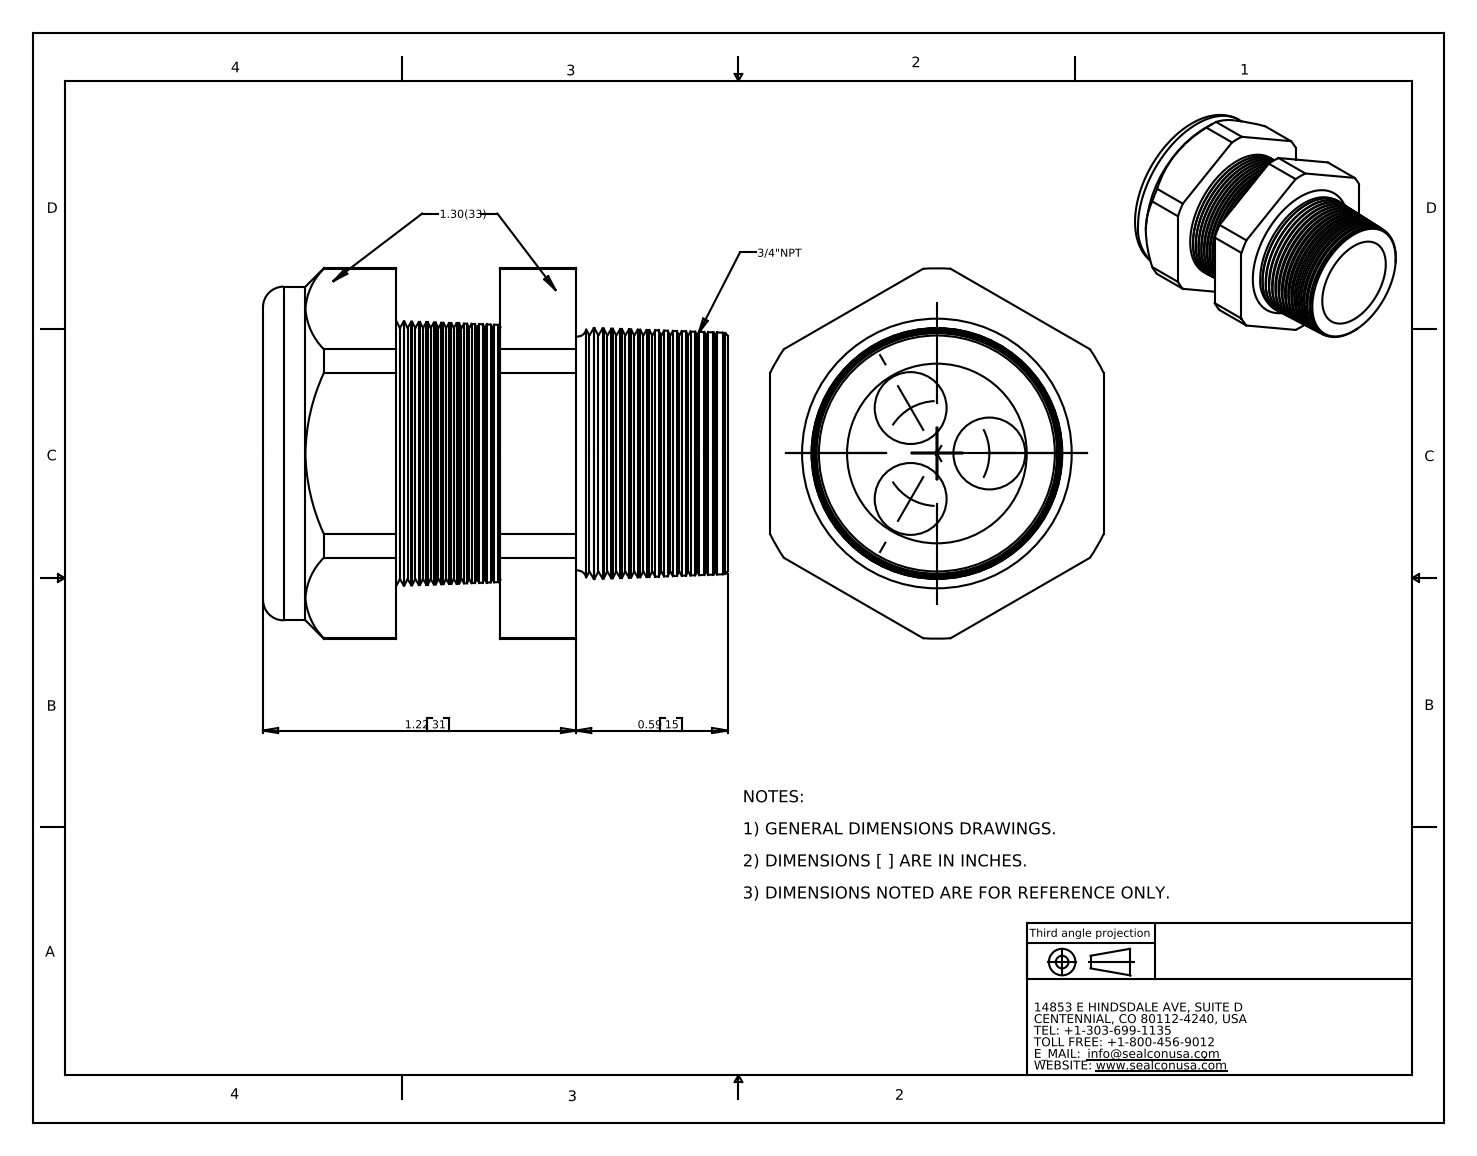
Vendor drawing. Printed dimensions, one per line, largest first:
1.22 31
0.59 15
